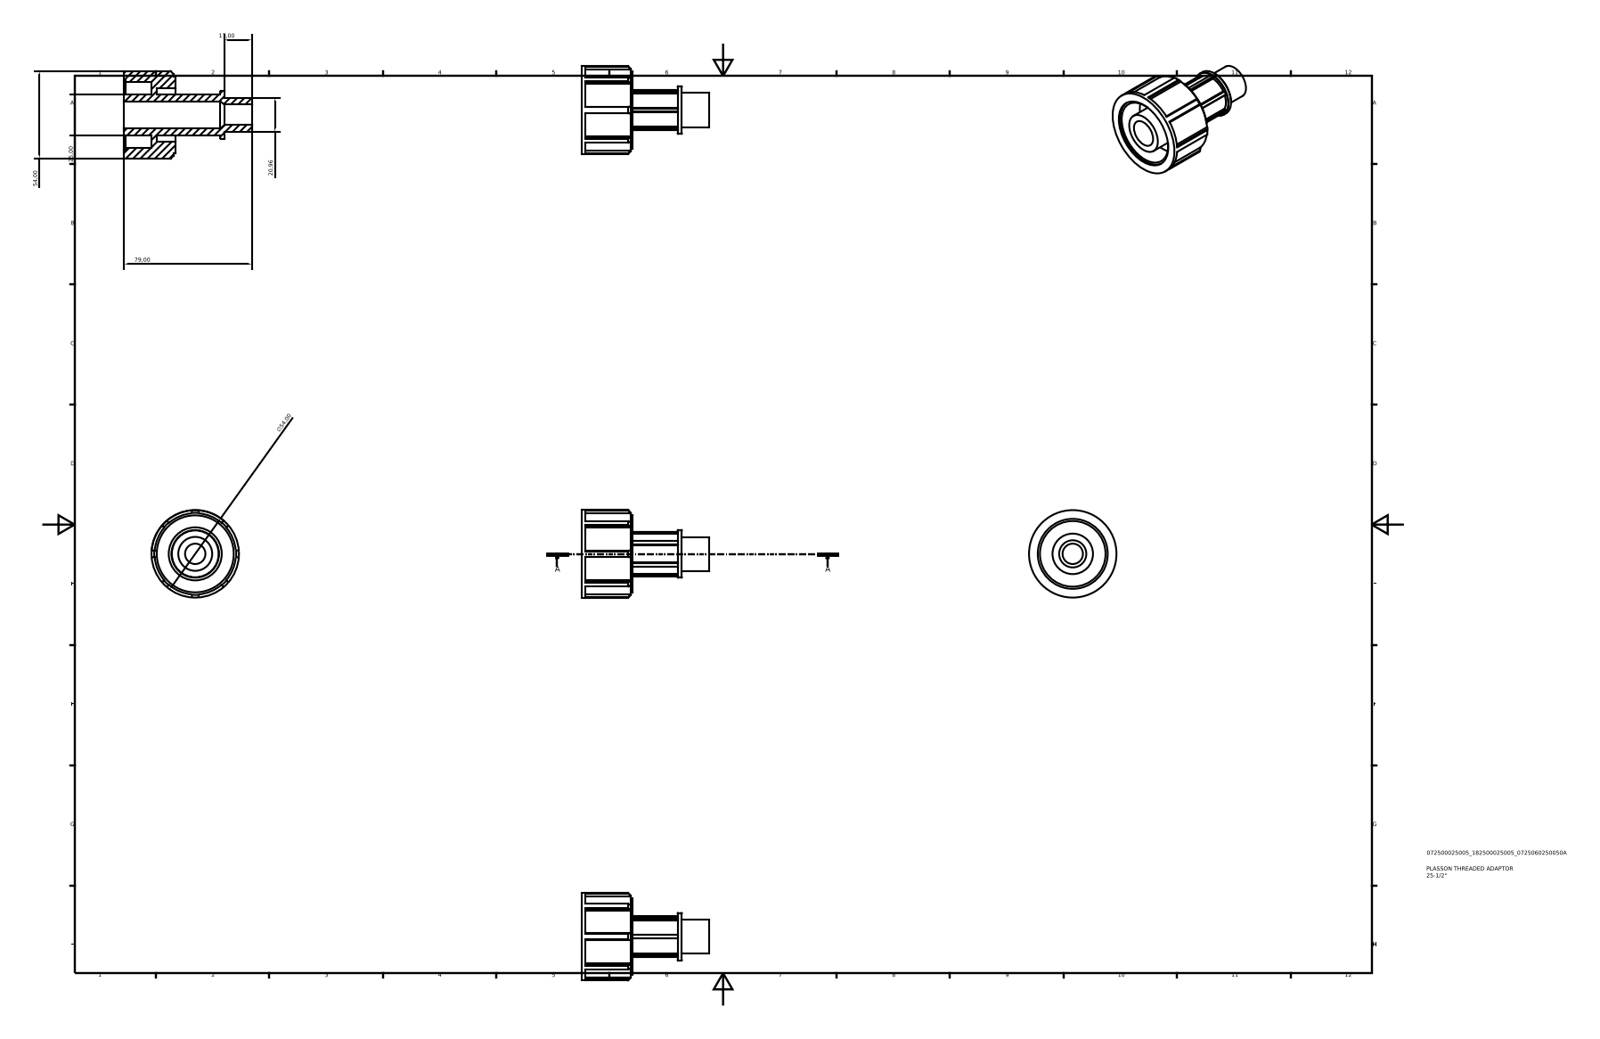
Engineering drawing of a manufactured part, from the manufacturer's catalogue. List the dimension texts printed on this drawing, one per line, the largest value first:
79,00
54,00
∅54,00
25,00
20,96
17,00
